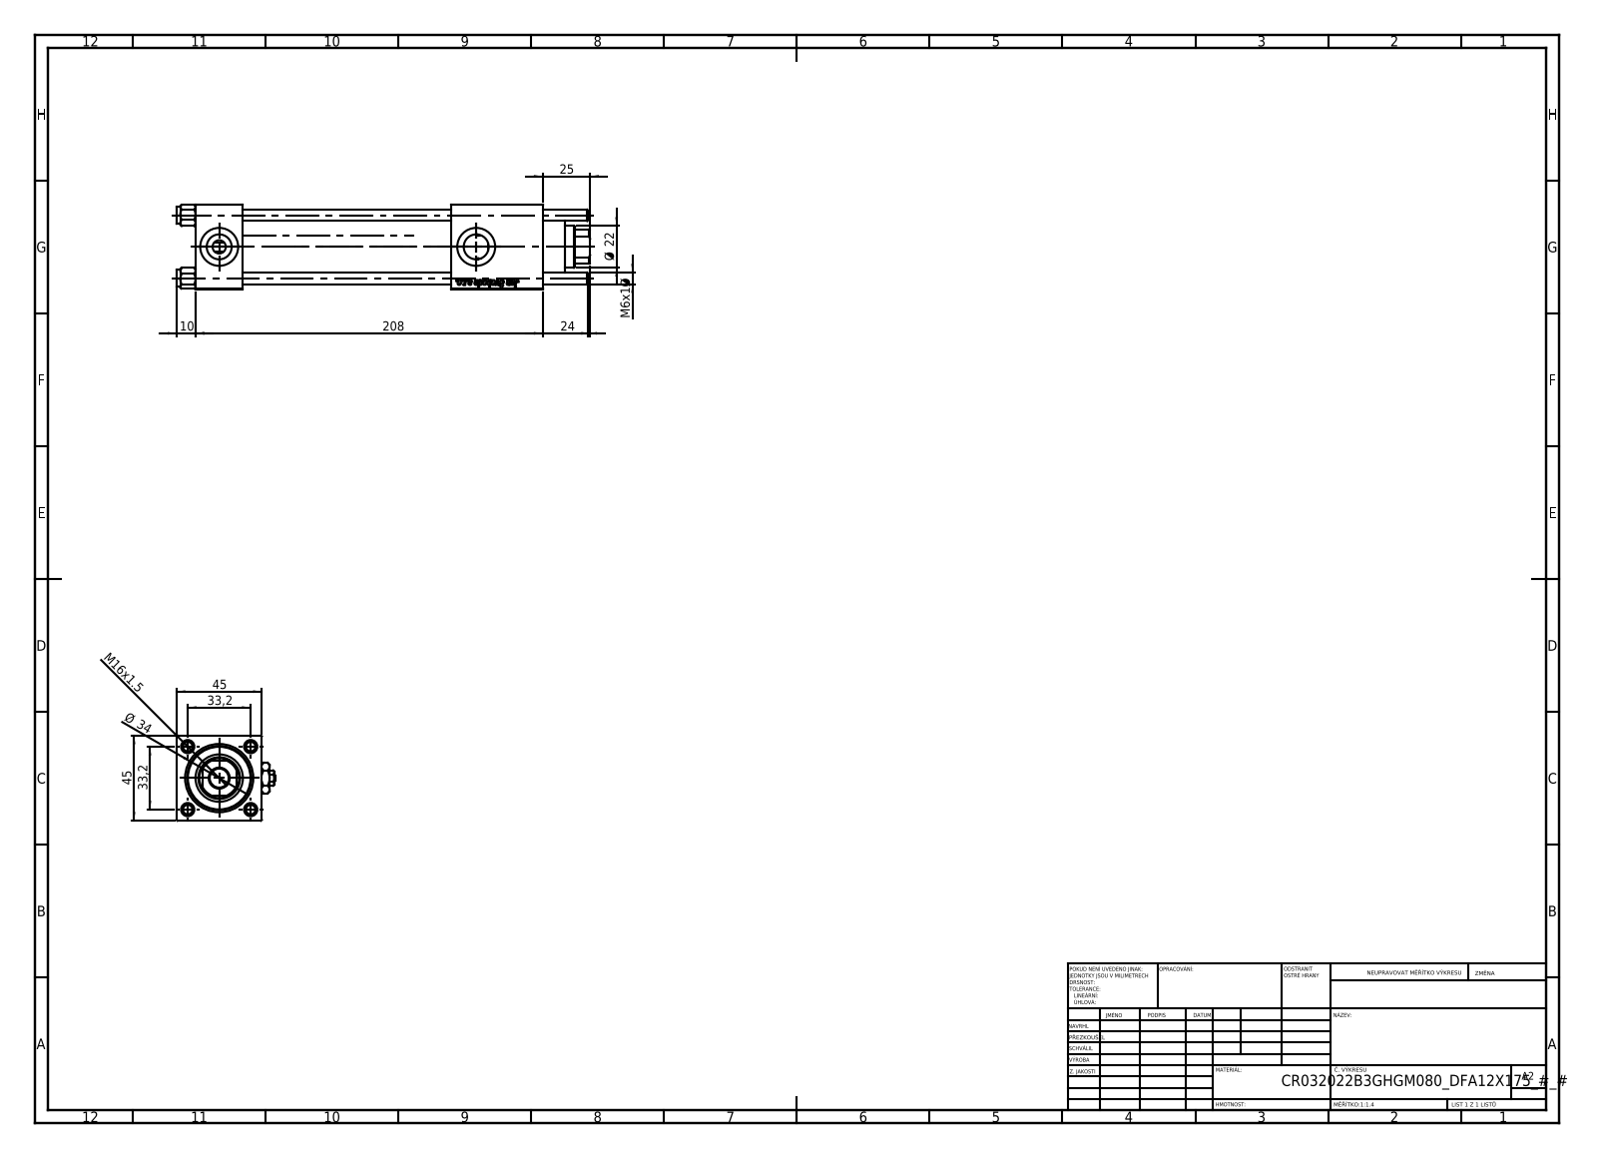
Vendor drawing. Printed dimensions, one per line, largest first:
208
45
45
Ø 34
33,2
33,2
25
24
Ø 22
M16x1.5
10
M6x1 Ø
